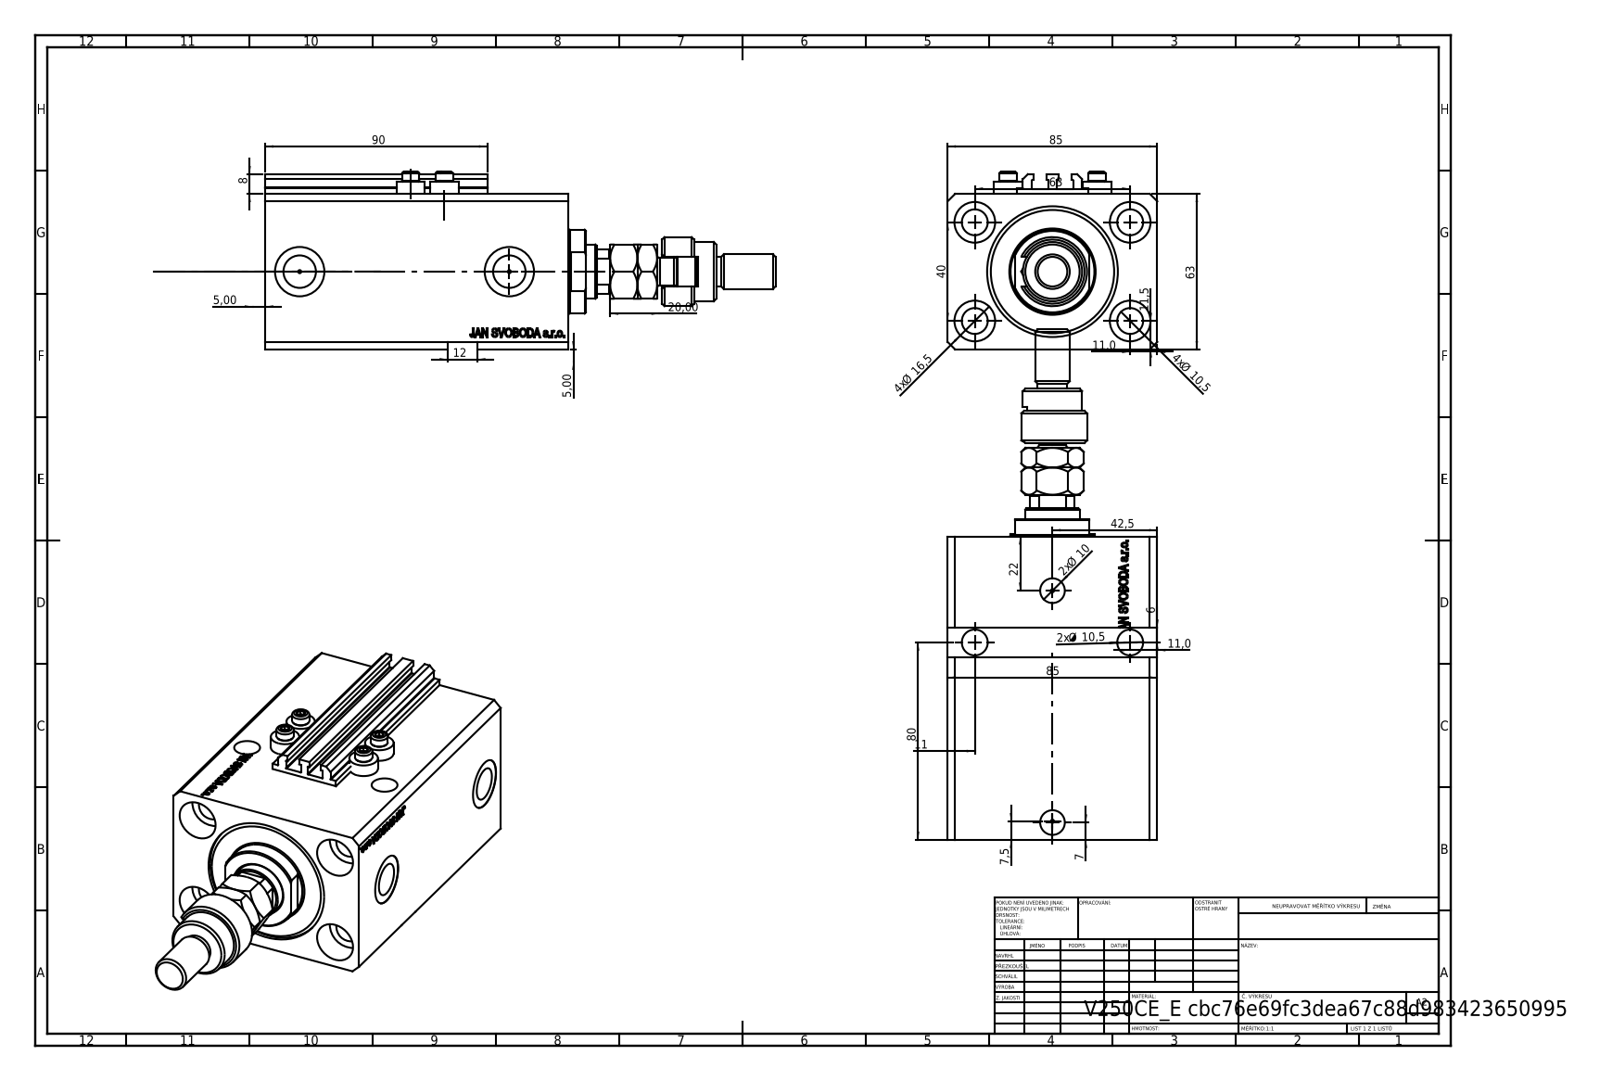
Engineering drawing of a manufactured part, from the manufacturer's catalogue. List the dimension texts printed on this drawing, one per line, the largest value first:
90
85
85
80
63
63
42,5
40
22
20,00
4x Ø 16,5
12
11,5
11,0
11,0
11
4x Ø 10,5
2x Ø 10,5
2x Ø 10
8
7,5
7
6
5,00
5,00
